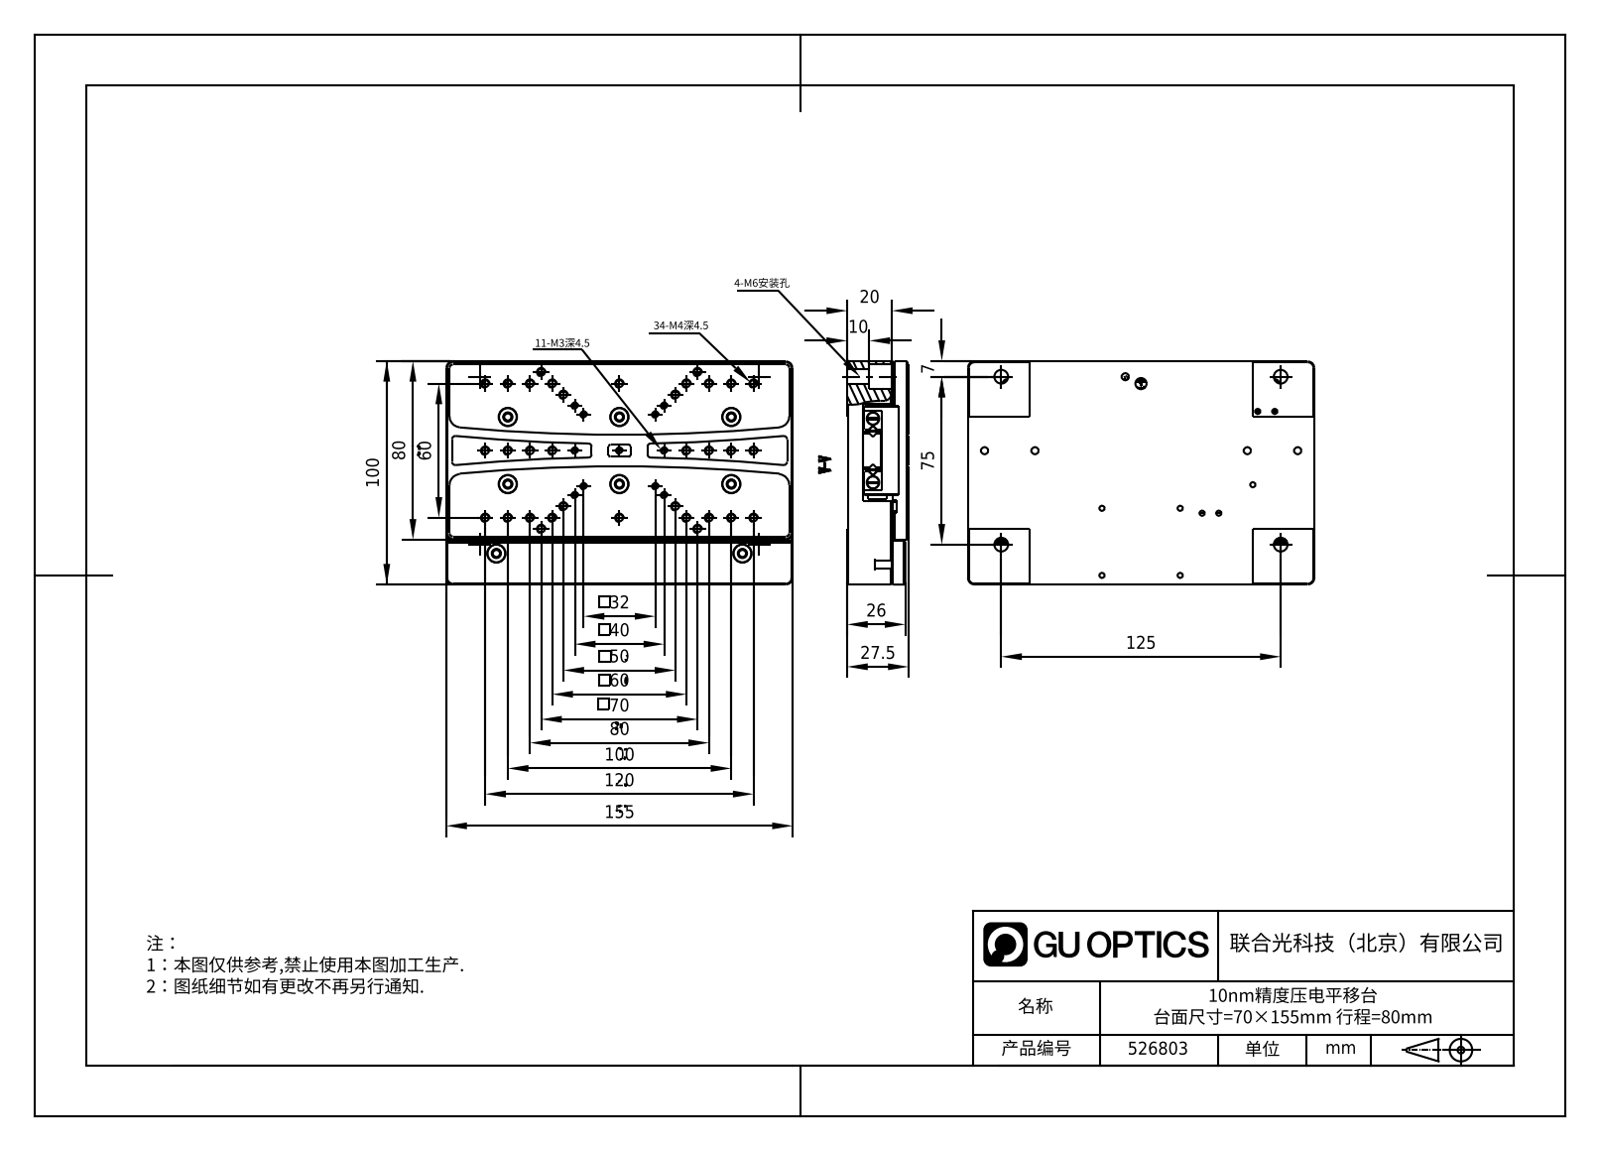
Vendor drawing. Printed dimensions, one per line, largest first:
155
125
120
100
100
80
80
75
70
60
60
50
40
32
27.5
26
20
10
7
